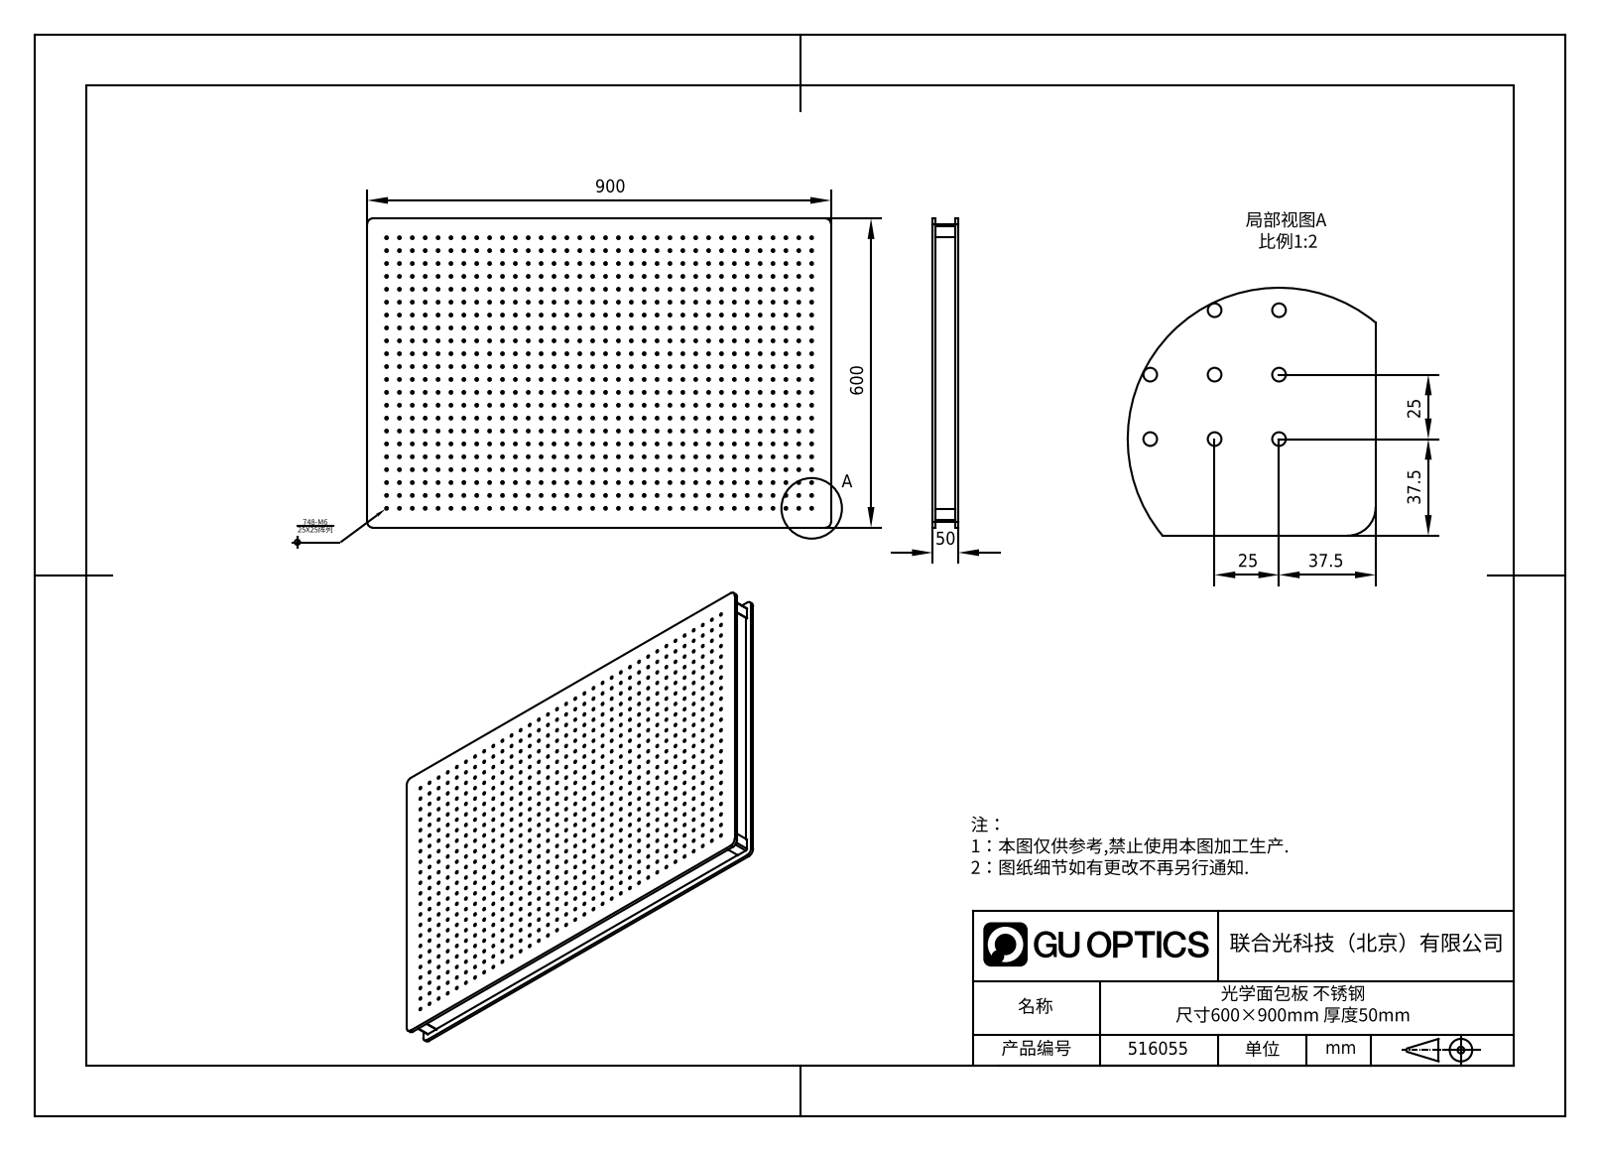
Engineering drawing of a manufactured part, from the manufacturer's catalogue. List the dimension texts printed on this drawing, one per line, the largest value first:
900
600
50
37.5
37.5
25
25
